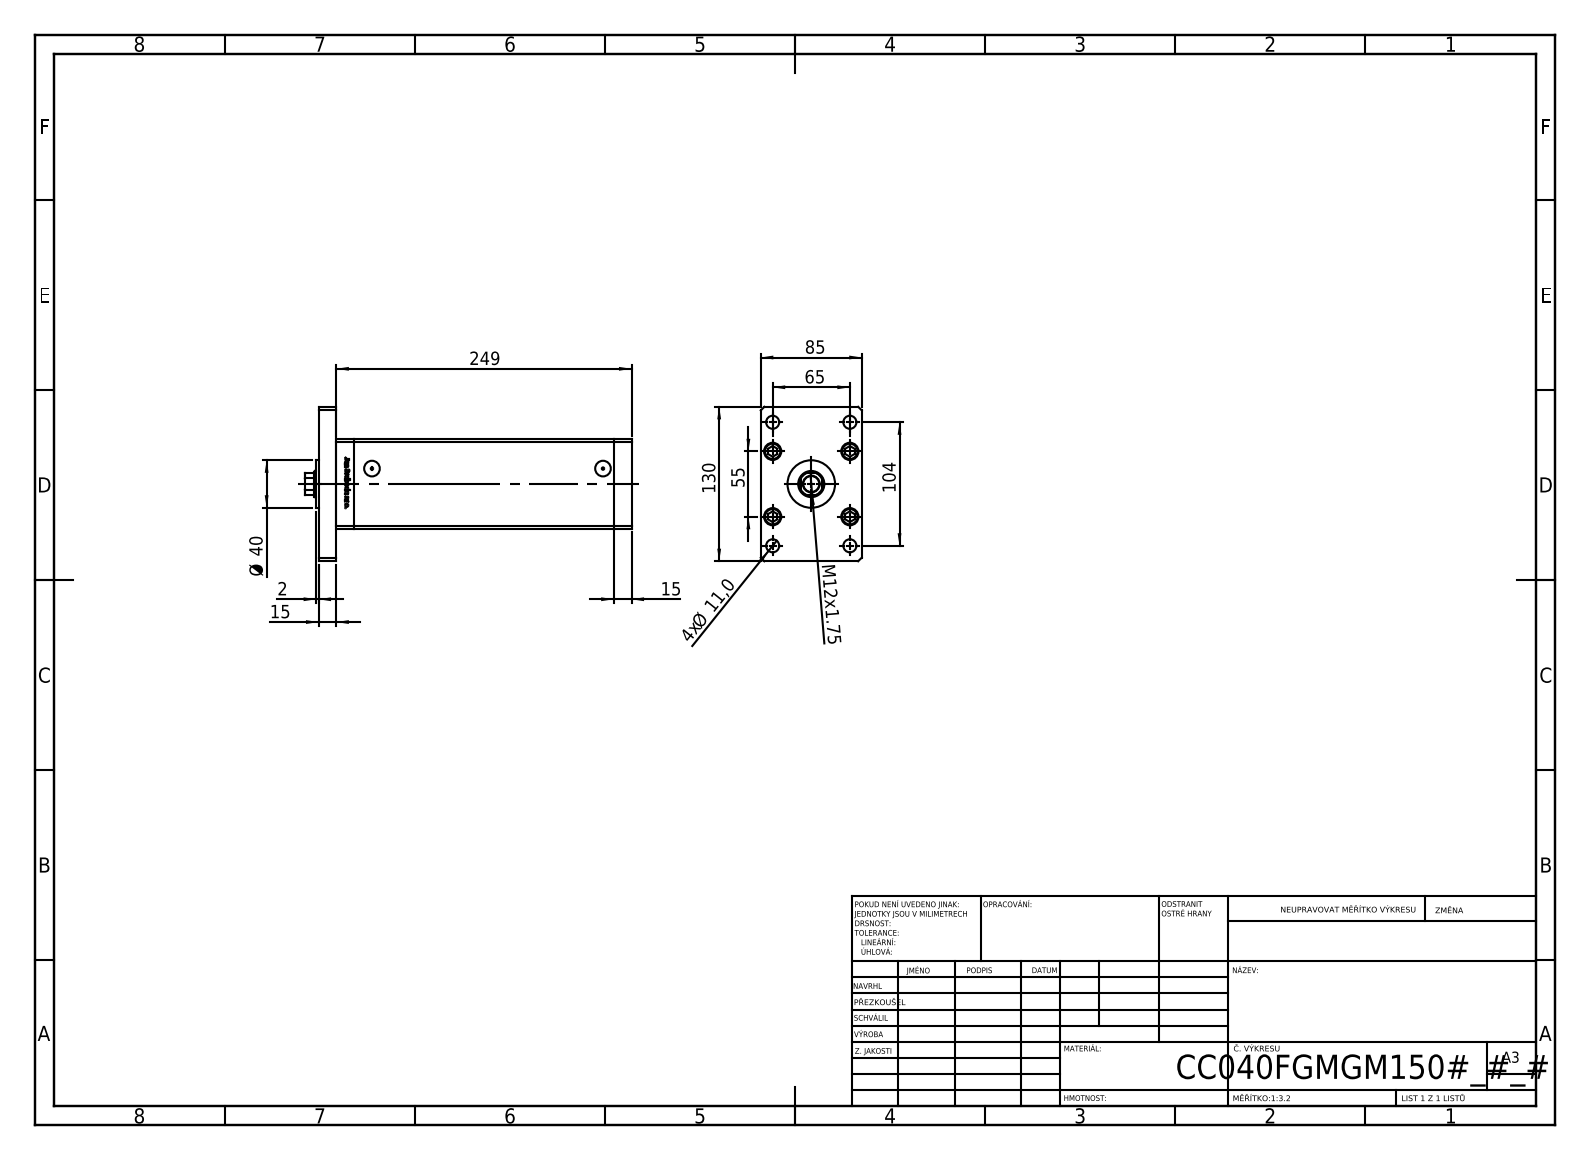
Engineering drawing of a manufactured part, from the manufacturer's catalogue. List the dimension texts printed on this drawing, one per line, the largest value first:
249
130
104
85
65
55
Ø 40
15
15
M12x1.75
4x Ø 11,0
2
